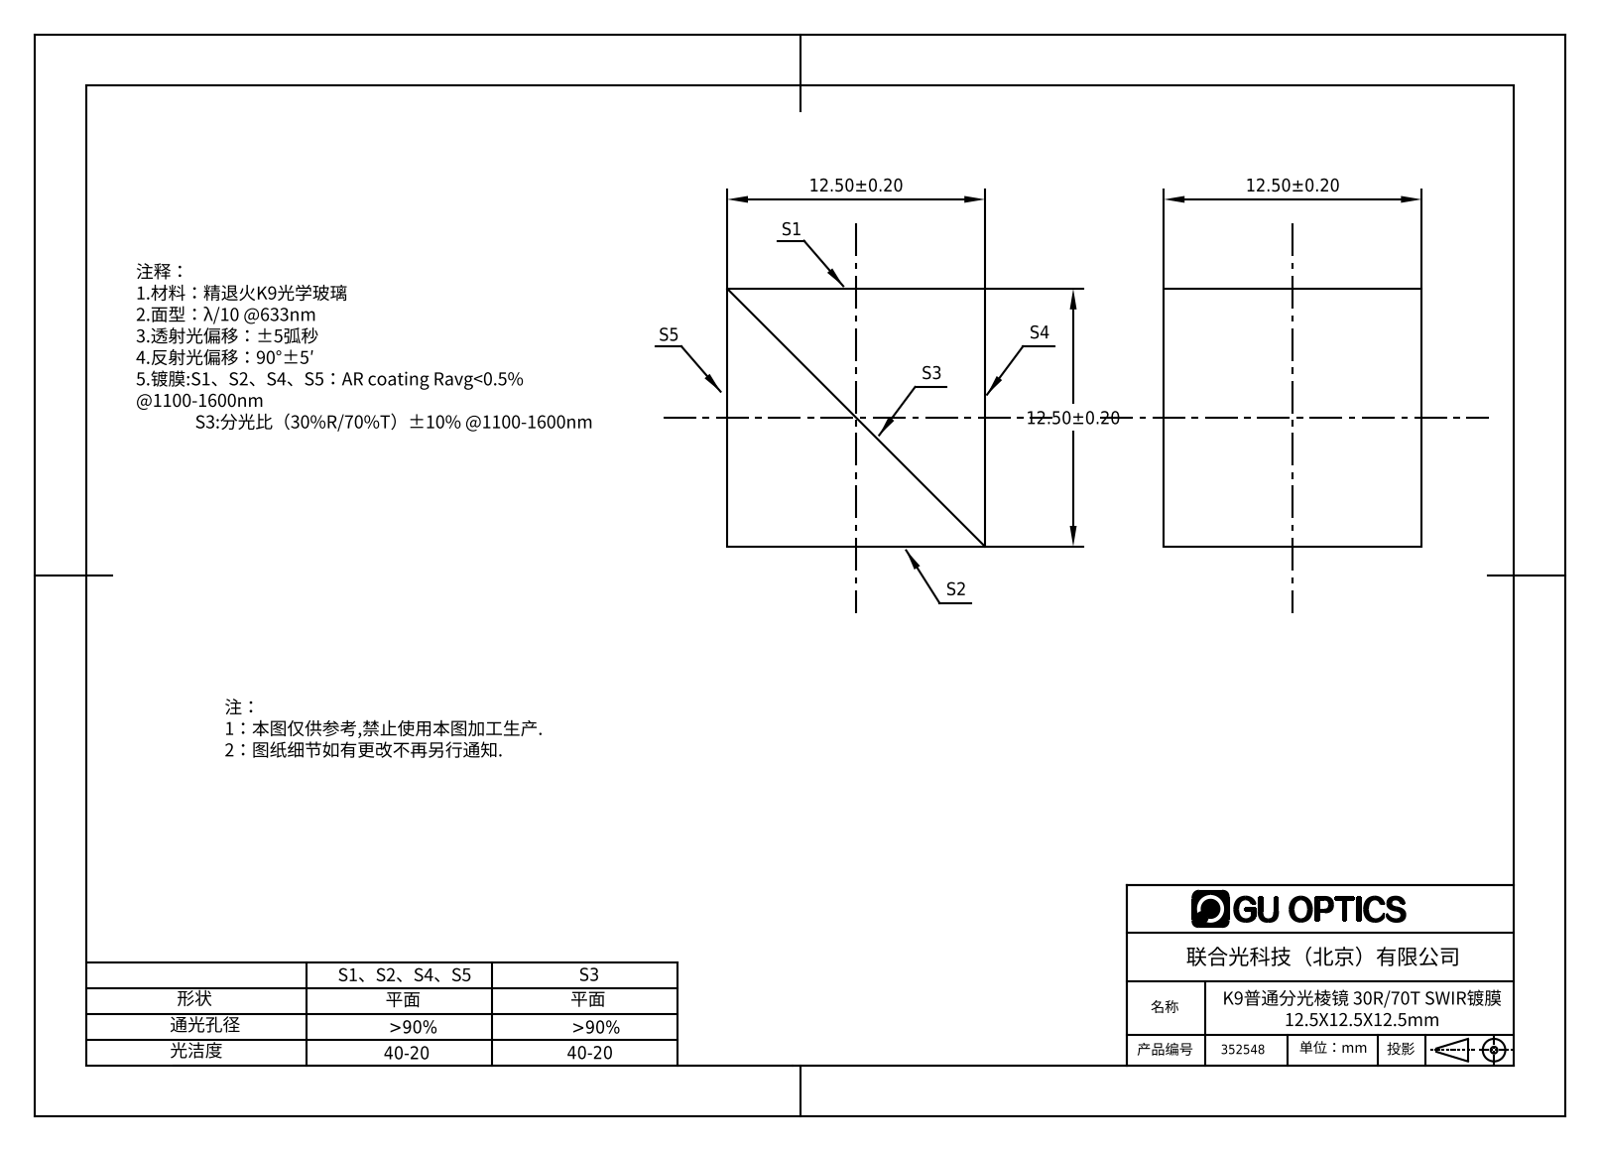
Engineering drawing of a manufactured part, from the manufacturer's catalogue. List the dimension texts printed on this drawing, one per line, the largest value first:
12.50±0.20
12.50±0.20
12.50±0.20
